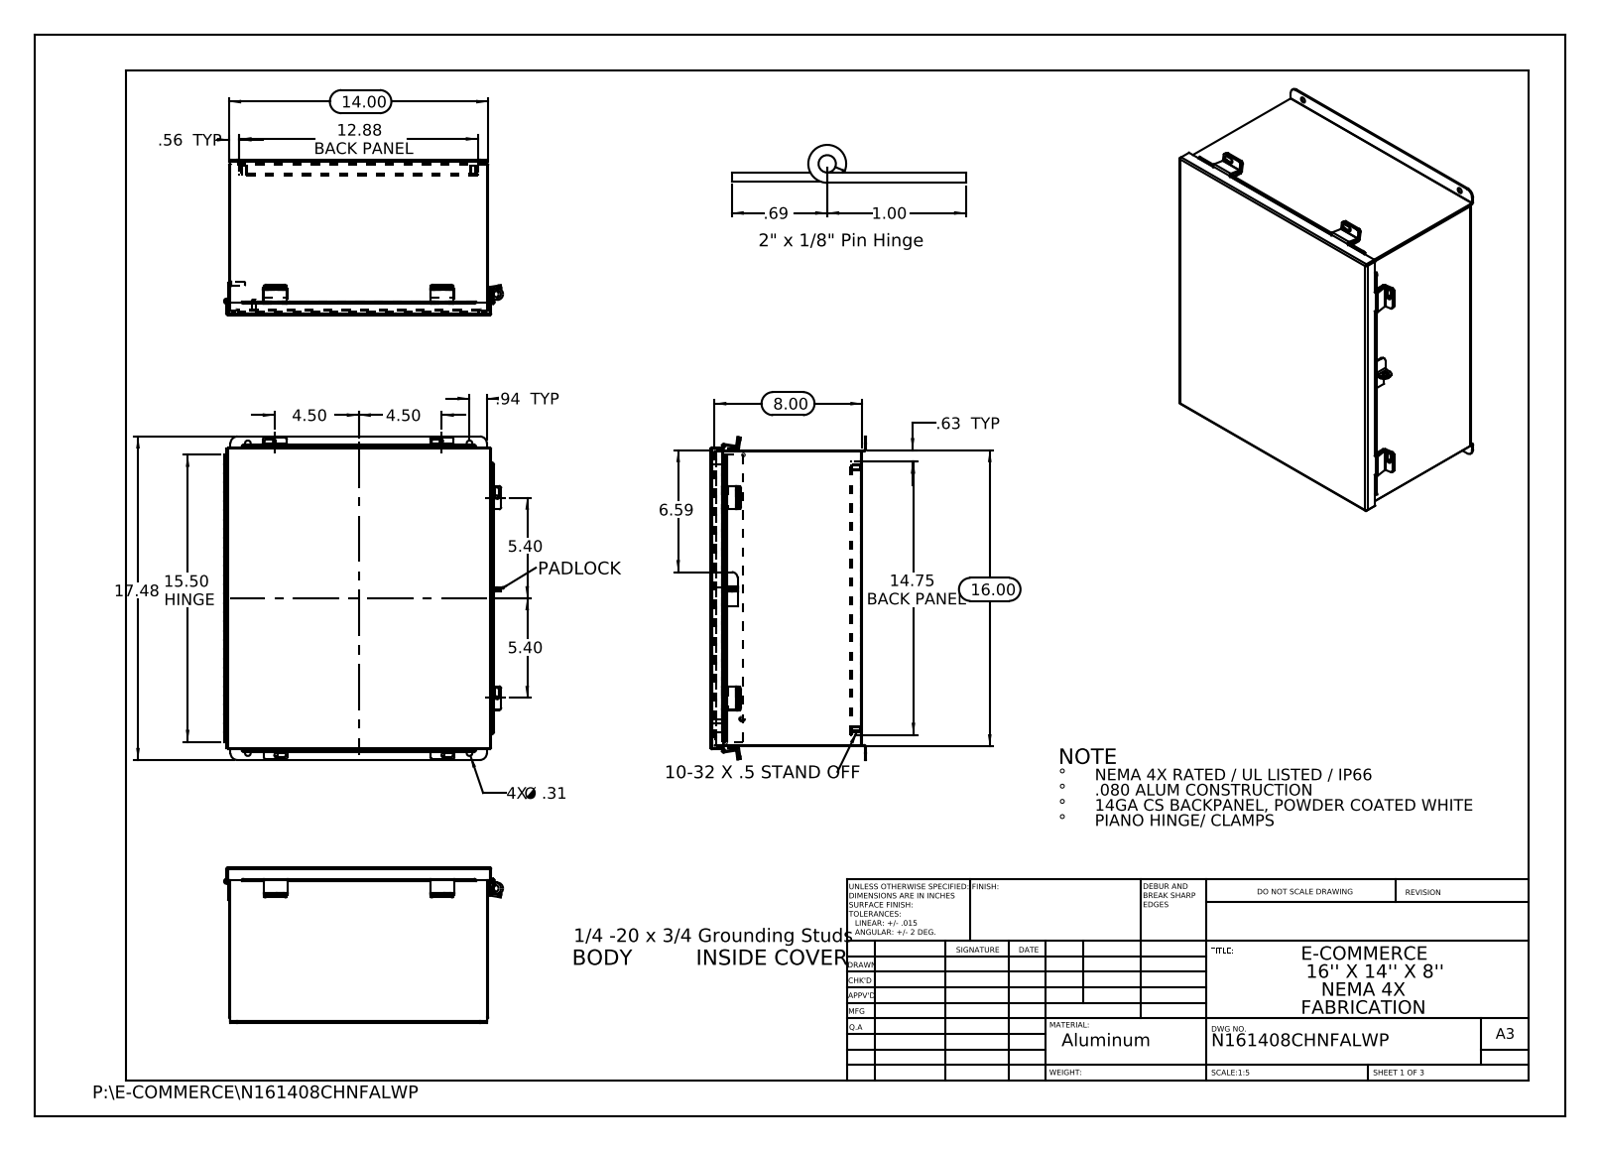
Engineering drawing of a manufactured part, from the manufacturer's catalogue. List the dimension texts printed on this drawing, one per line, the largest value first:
17.48
16.00
15.50 HINGE
14.75 BACK PANEL
14.00
12.88 BACK PANEL
8.00
6.59
5.40
5.40
4.50
4.50
1.00
.94 TYP
.69
.63 TYP
.56 TYP
4X Ø .31
